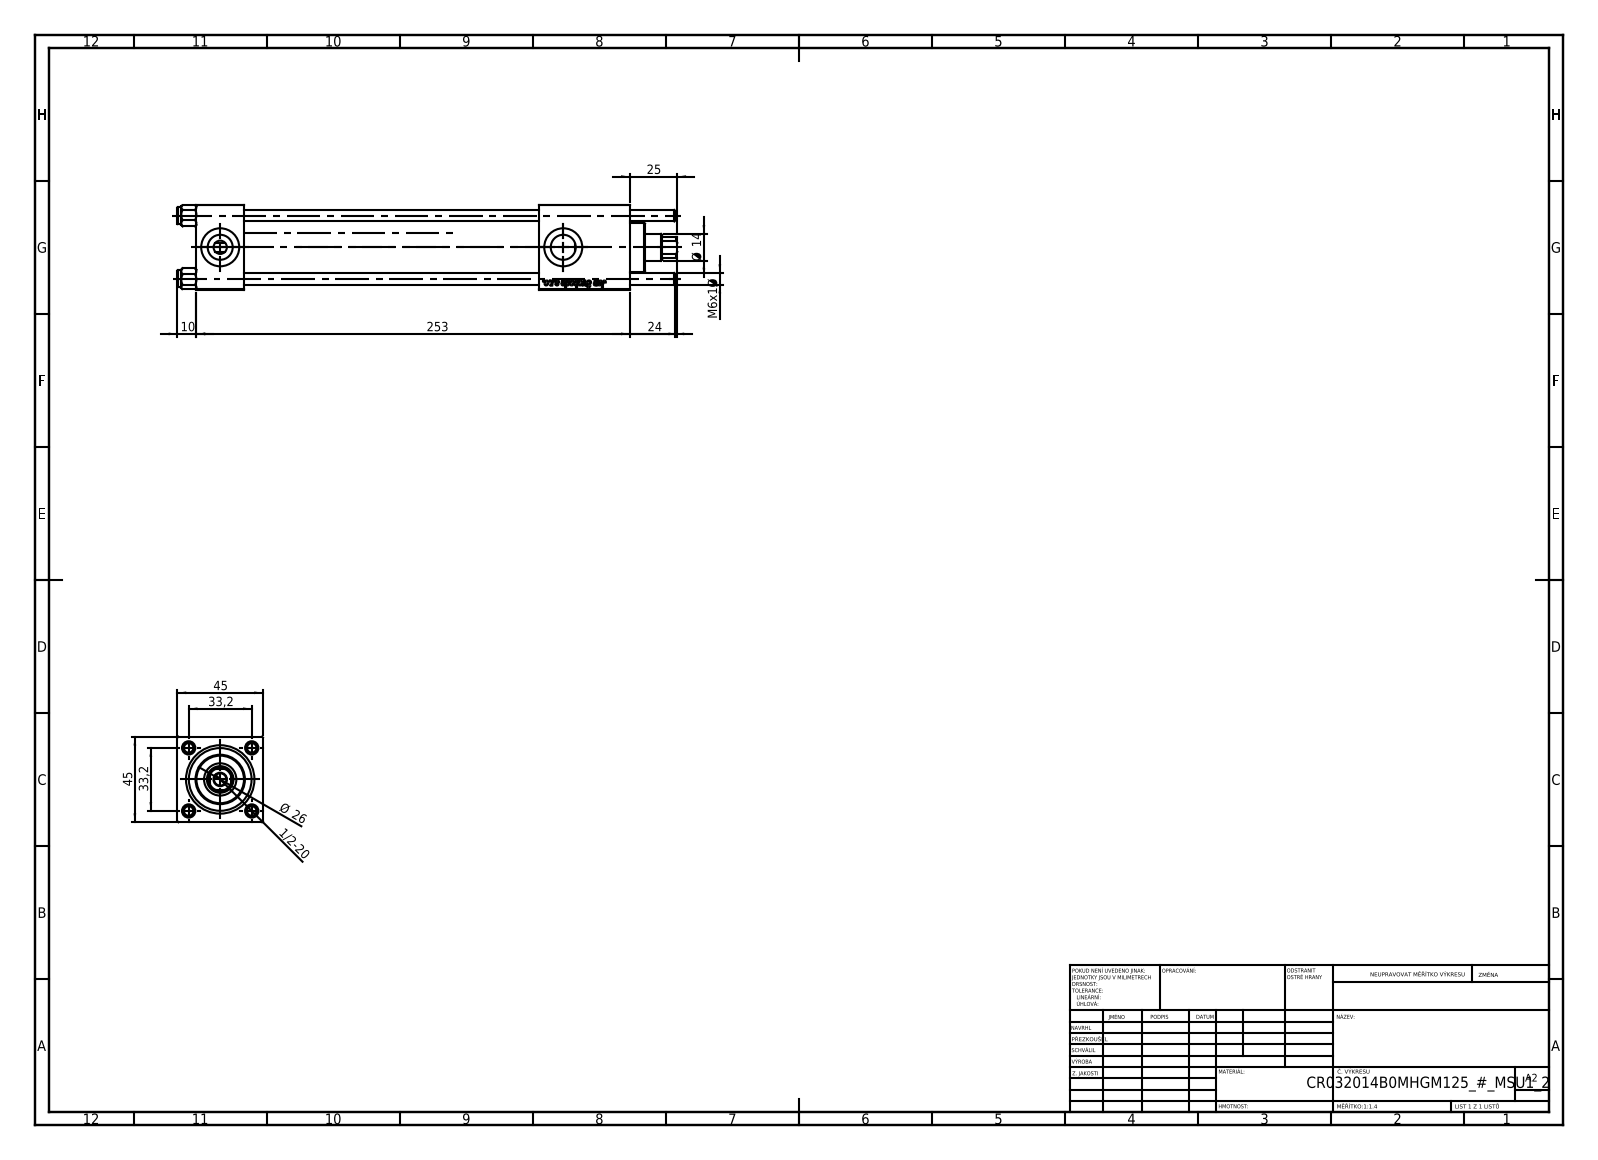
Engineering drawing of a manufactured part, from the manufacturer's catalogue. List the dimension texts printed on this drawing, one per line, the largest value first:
253
45
45
33,2
33,2
Ø 26
25
24
Ø 14
10
M6x1 Ø
1/2-20
